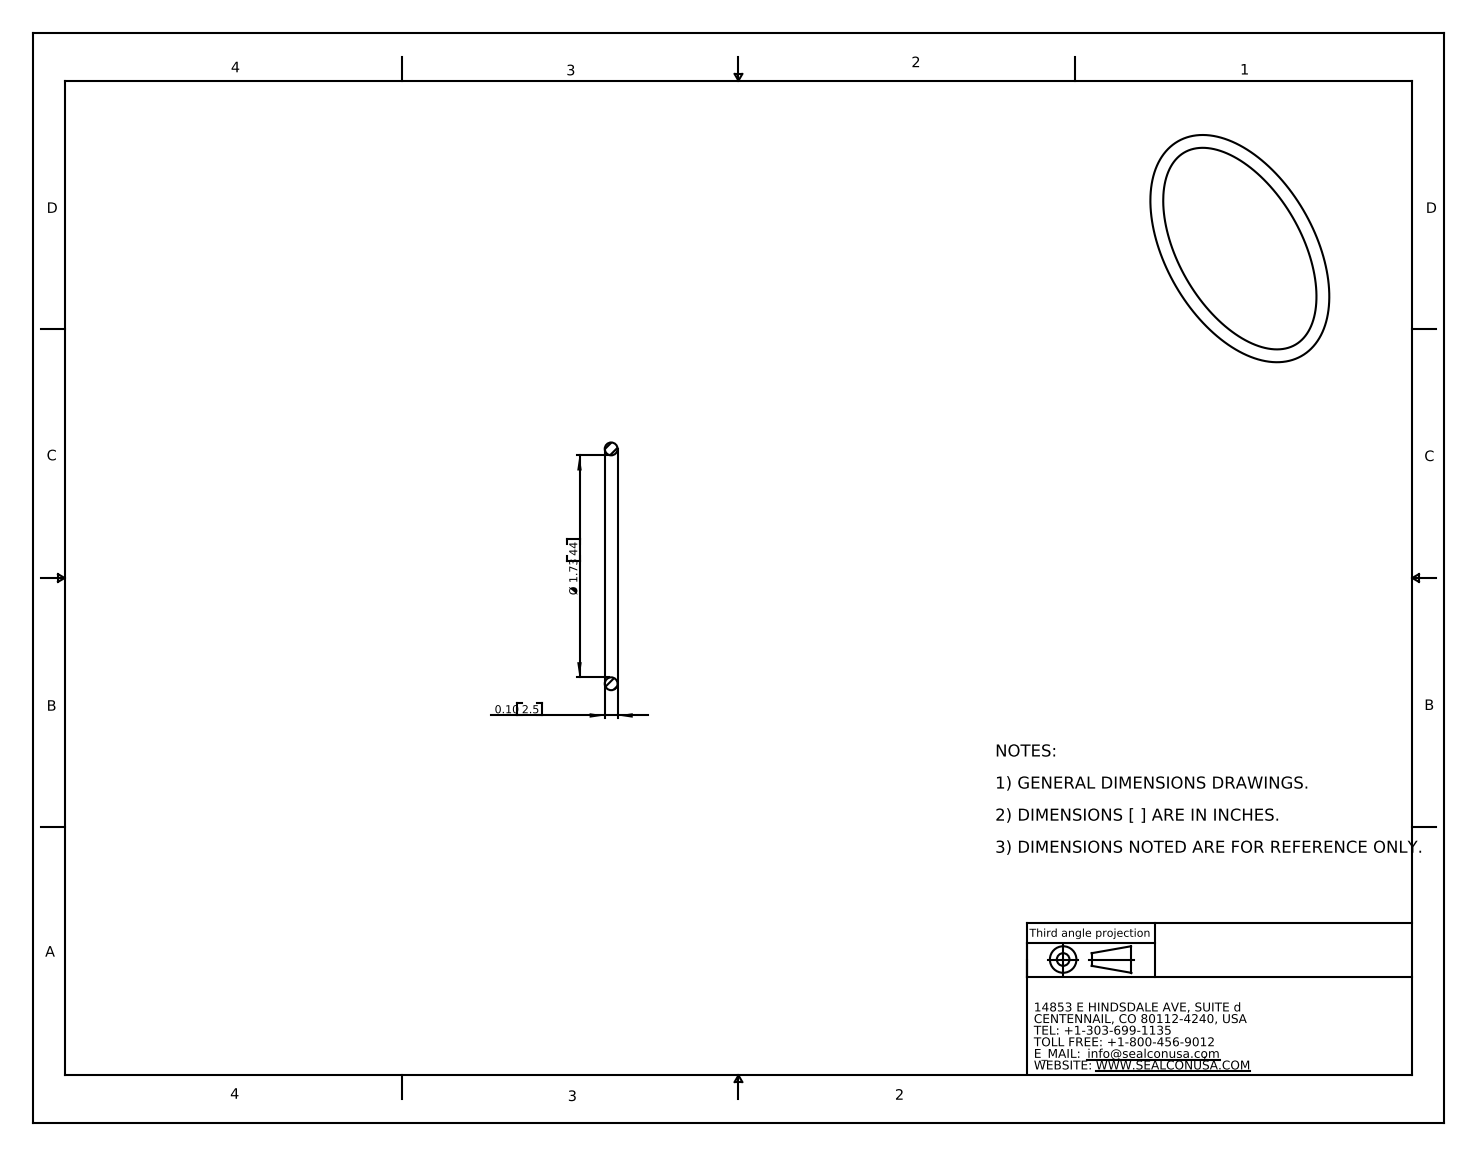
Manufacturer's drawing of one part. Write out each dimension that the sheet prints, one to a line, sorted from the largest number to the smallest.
Ø 1.73 44
0.10 2.5
